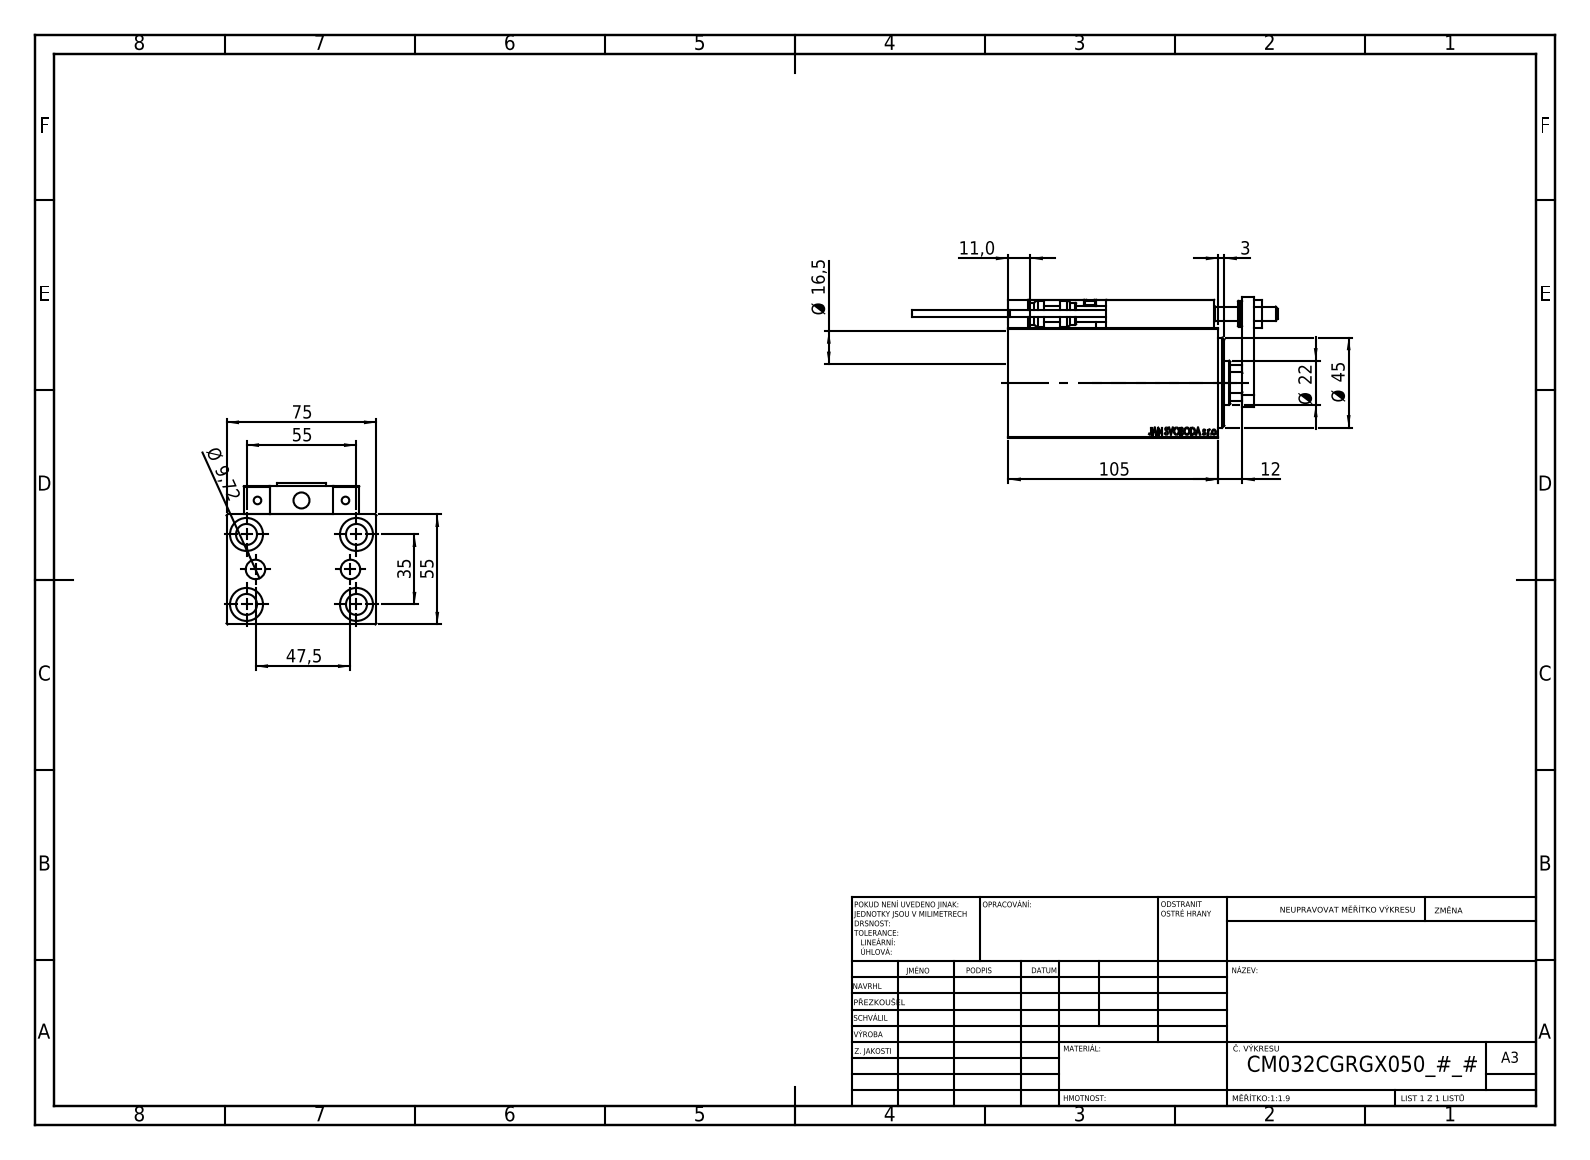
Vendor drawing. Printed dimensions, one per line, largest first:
105
75
55
55
47,5
Ø 45
35
Ø 22
Ø 16,5
12
11,0
Ø 9,72
3
